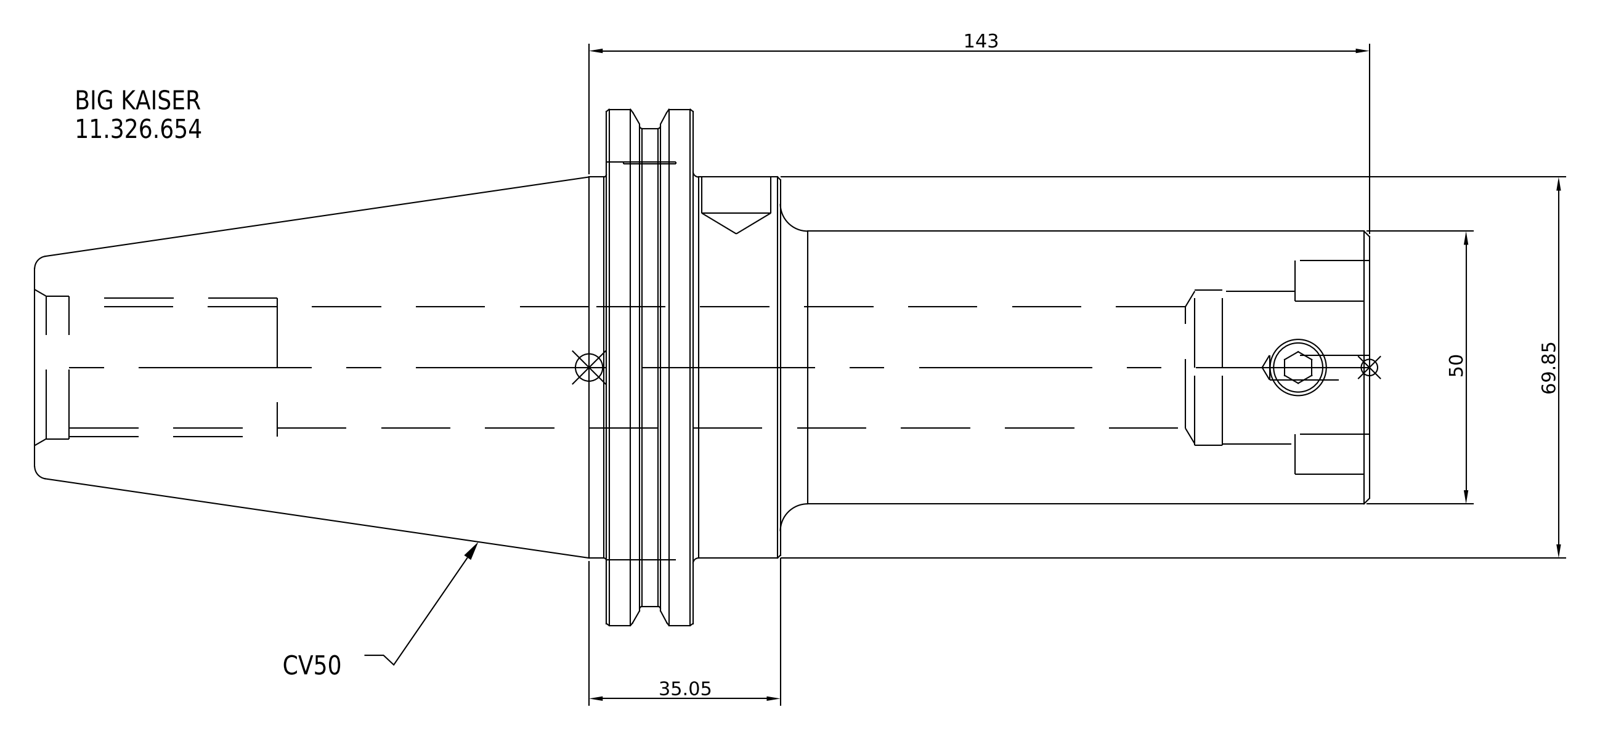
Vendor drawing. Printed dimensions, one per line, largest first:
143
69.85
50
35.05
